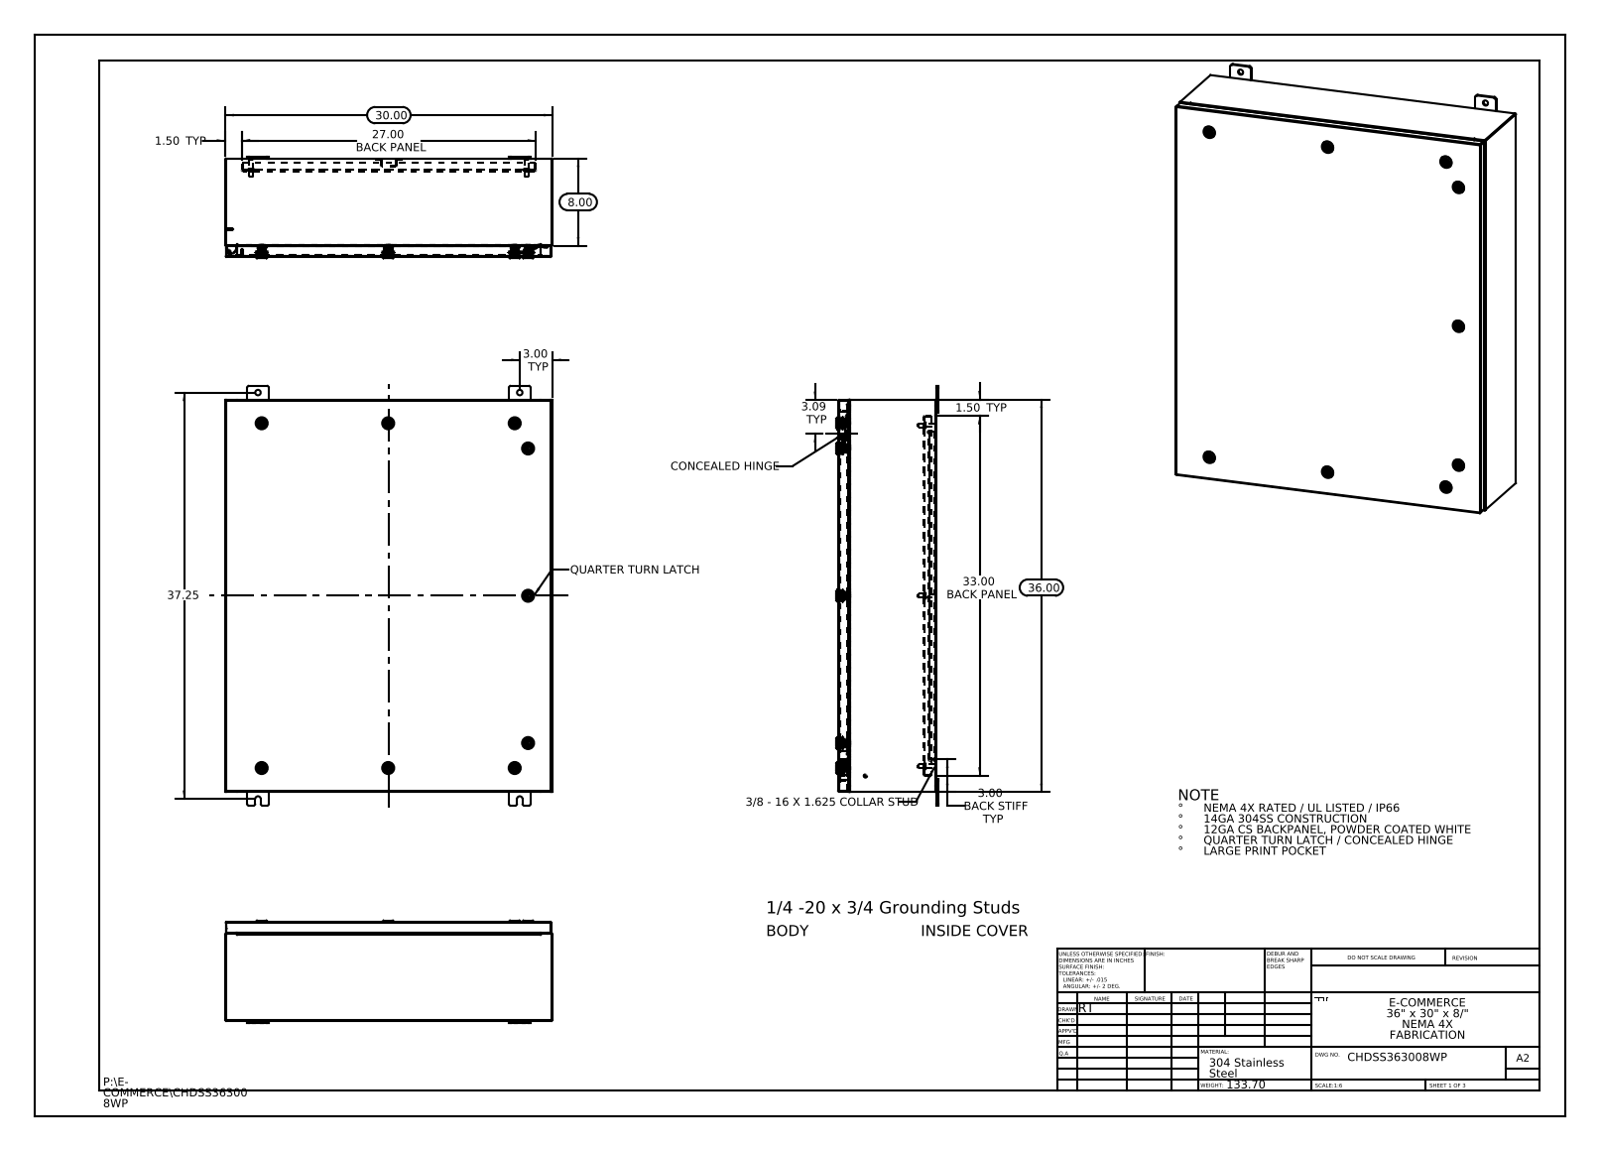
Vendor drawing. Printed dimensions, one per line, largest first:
37.25
36.00
33.00 BACK PANEL
30.00
27.00 BACK PANEL
8.00
3.09 TYP
3.00 TYP
3.00 BACK STIFF TYP
1.50 TYP
1.50 TYP
